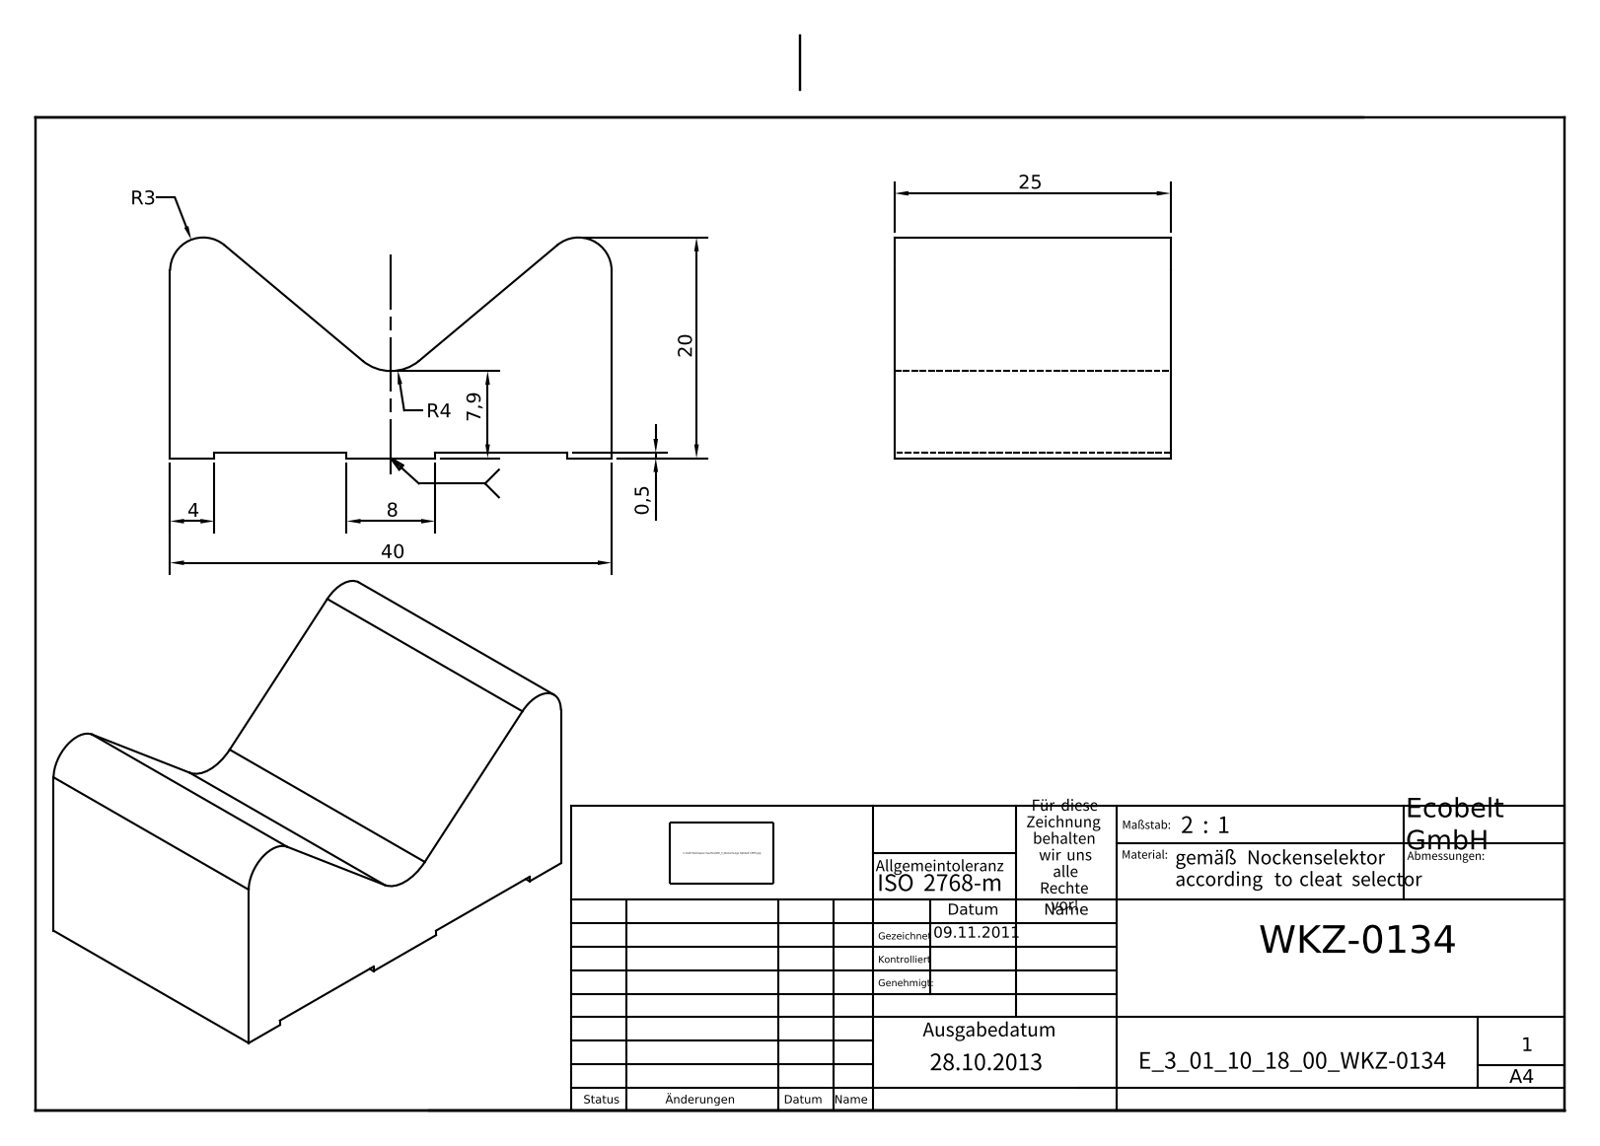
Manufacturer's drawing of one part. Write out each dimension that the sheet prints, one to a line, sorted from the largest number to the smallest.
40
25
20
8
7,9
4
R4
R3
0,5
